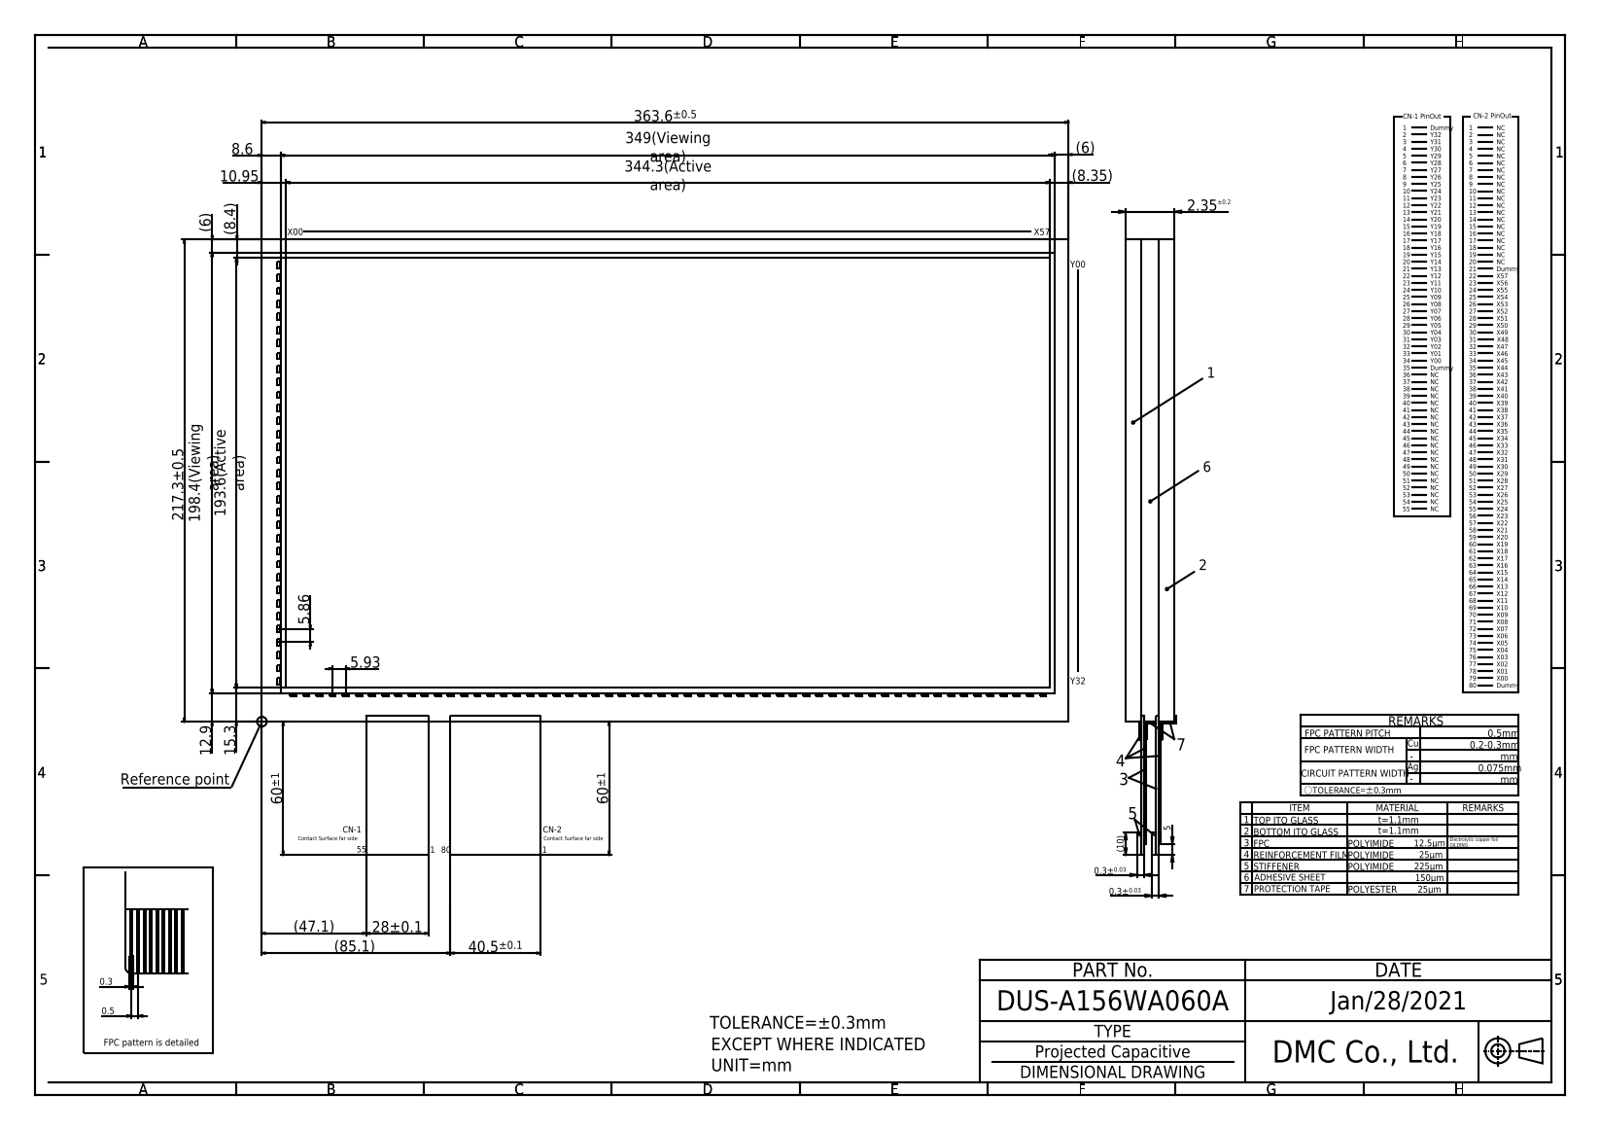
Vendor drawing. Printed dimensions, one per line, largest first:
363.6±0.5
349(Viewing area)
344.3(Active area)
217.3±0.5
198.4(Viewing area)
193.6(Active area)
(85.1)
60±1
60±1
(47.1)
40.5±0.1
28±0.1
15.3
12.9
10.95
(10)
8.6
(8.4)
(8.35)
(6)
(6)
5.93
5.86
5
2.35±0.2
0.5
0.3
0.3±0.03
0.3±0.03
